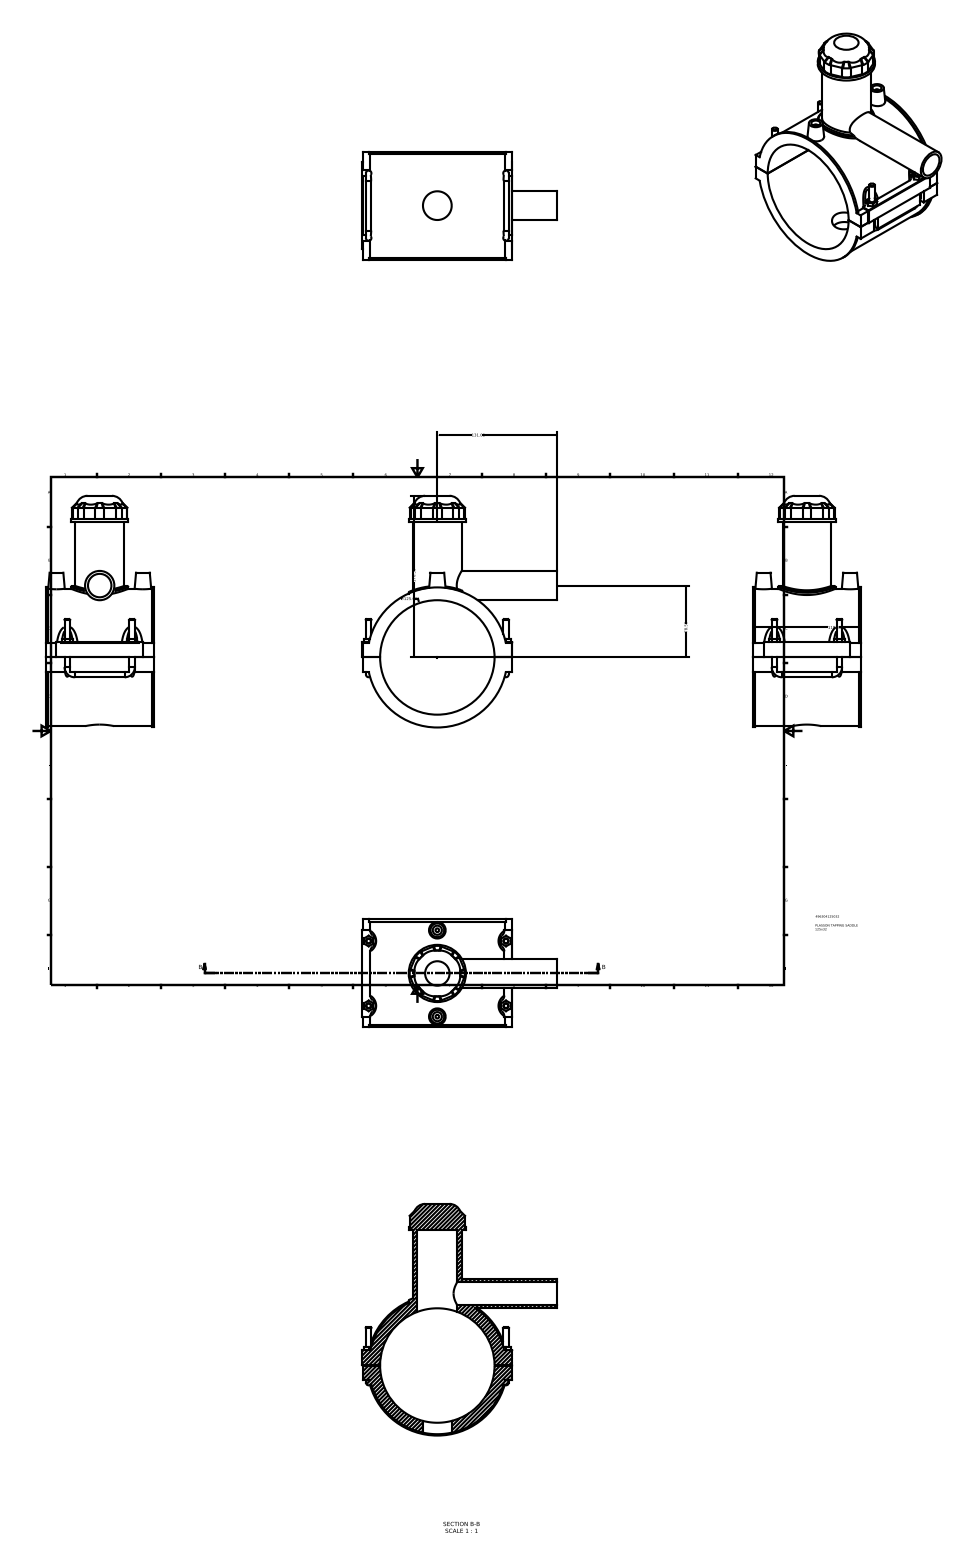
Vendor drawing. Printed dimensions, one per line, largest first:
176.50
131.00
∅125.00
118.00
78.50
